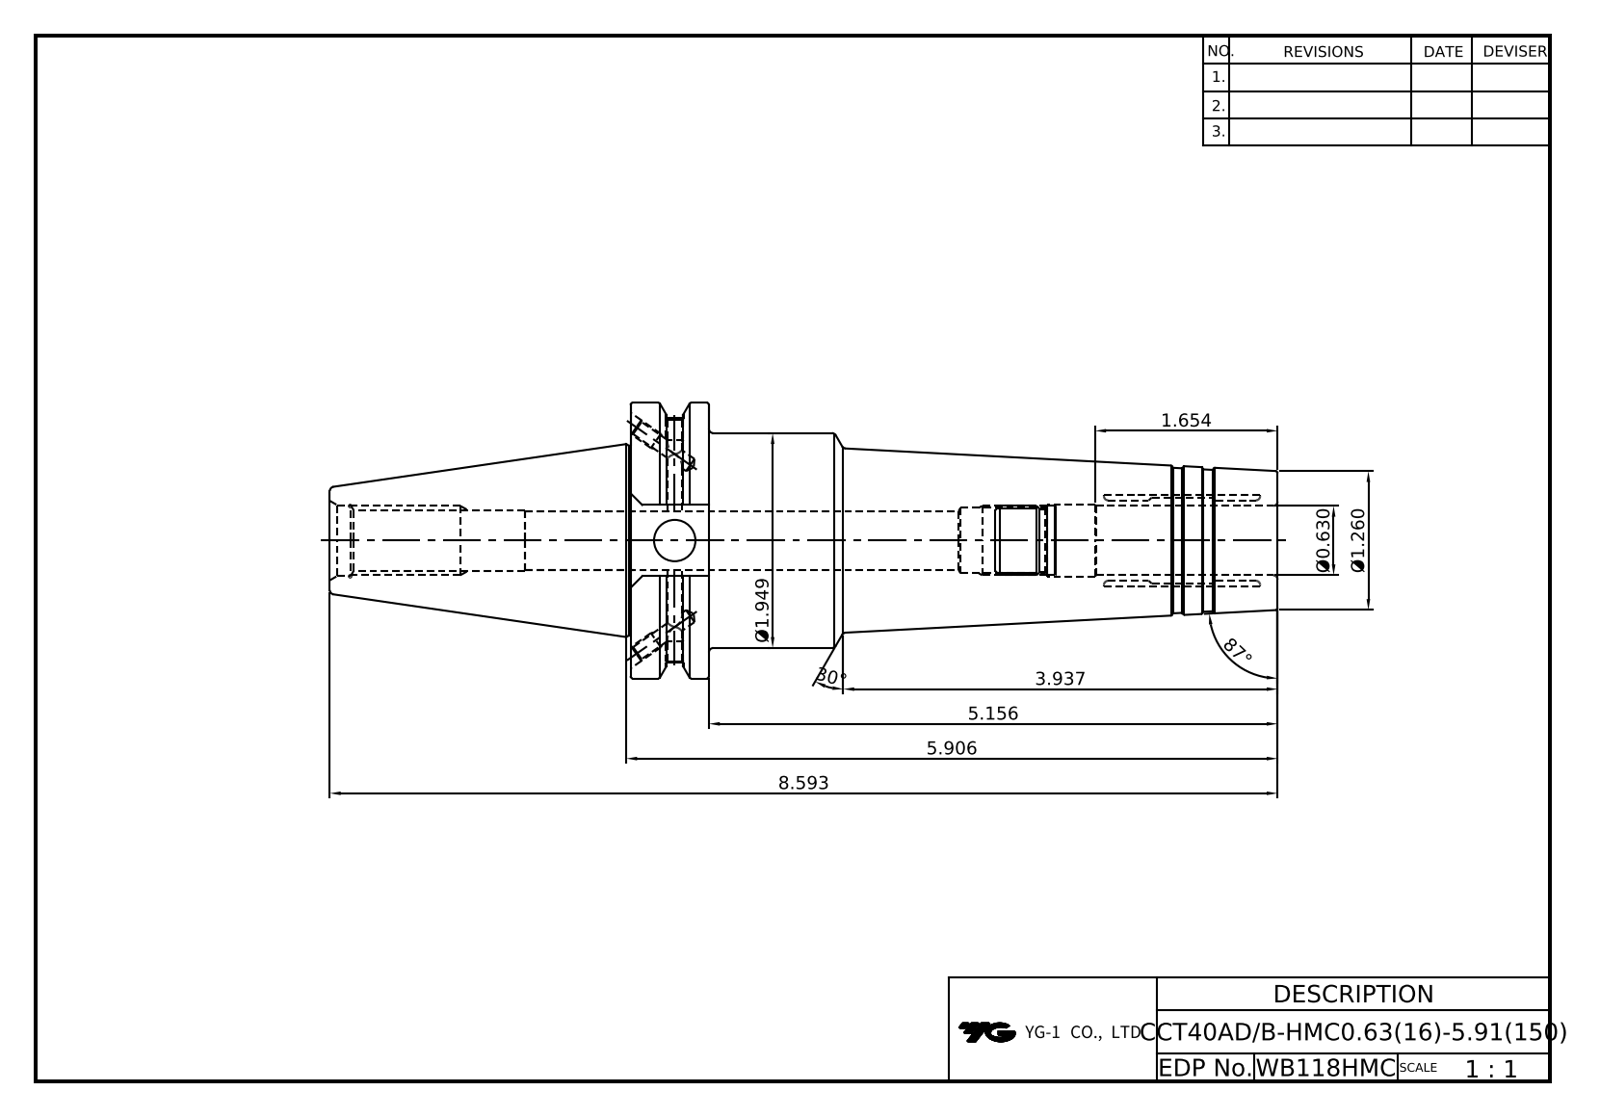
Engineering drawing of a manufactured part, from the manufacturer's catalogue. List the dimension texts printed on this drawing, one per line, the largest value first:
87°
30°
8.593
5.906
5.156
3.937
Ø1.949
1.654
Ø1.260
Ø0.630
